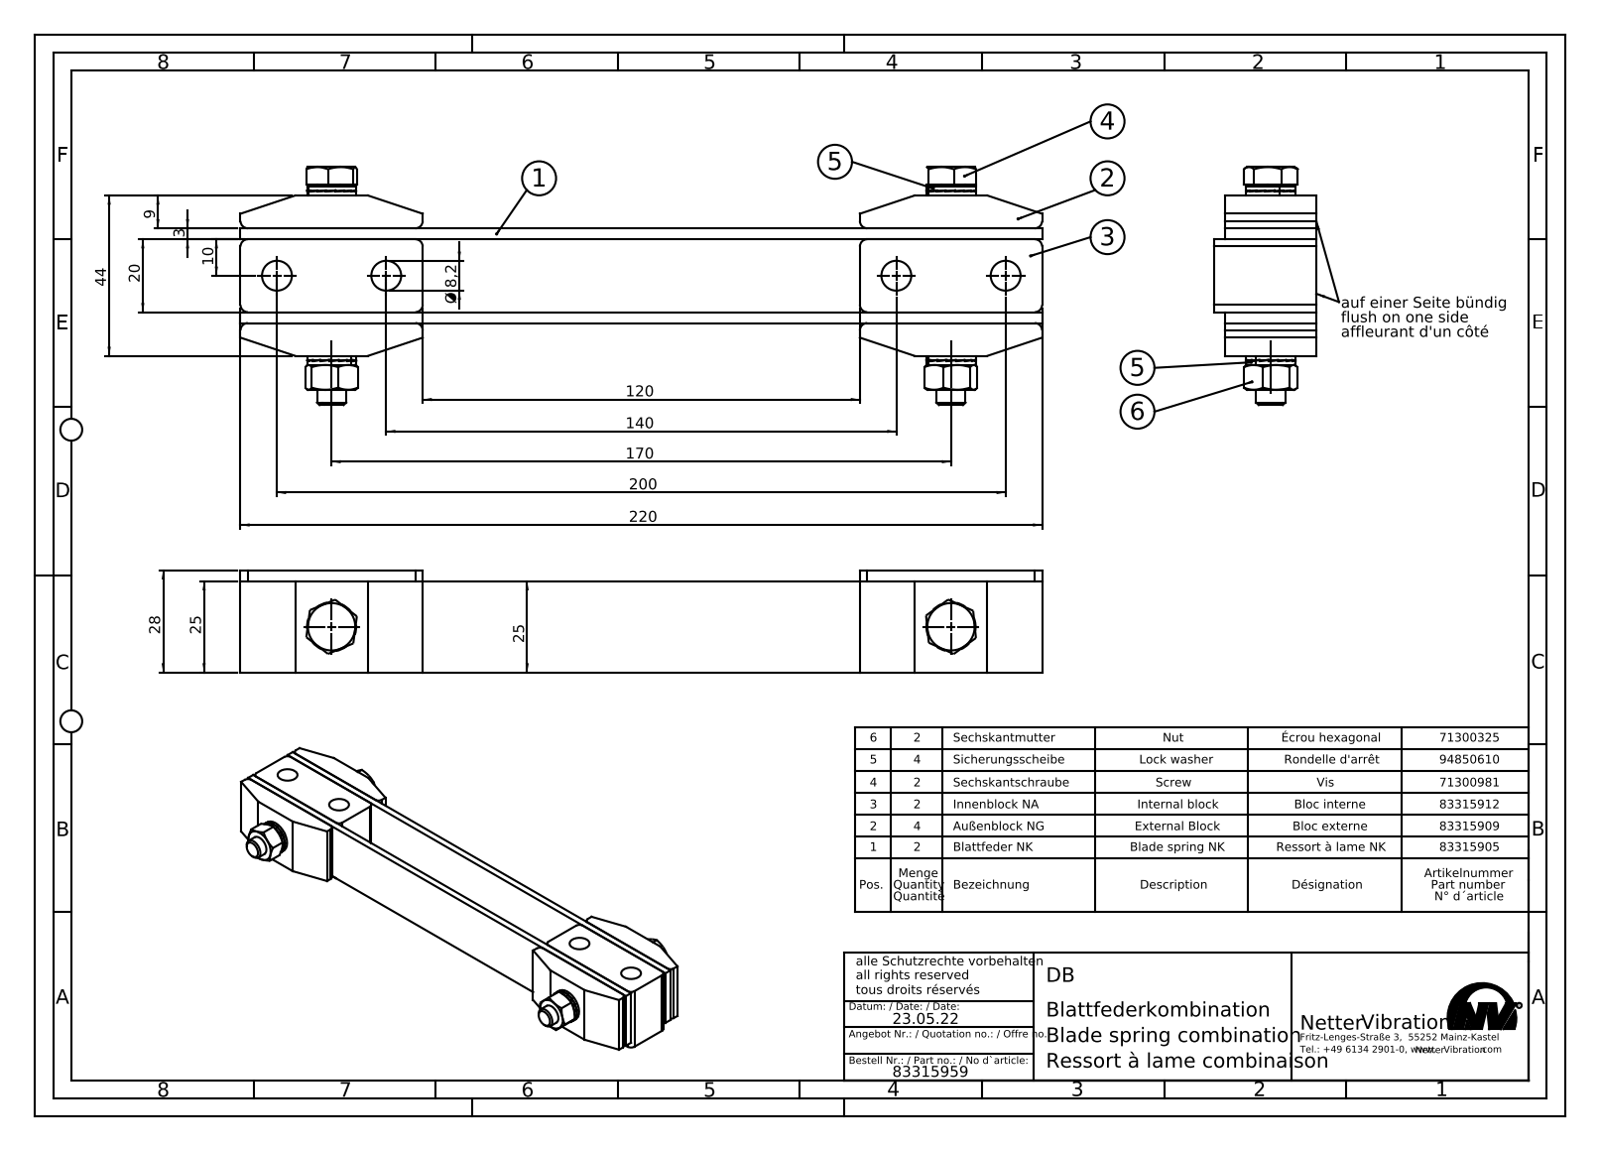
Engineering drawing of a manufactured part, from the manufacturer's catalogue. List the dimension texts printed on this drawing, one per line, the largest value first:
220
200
170
140
120
44
28
25
25
20
10
9
Ø 8,2
3
